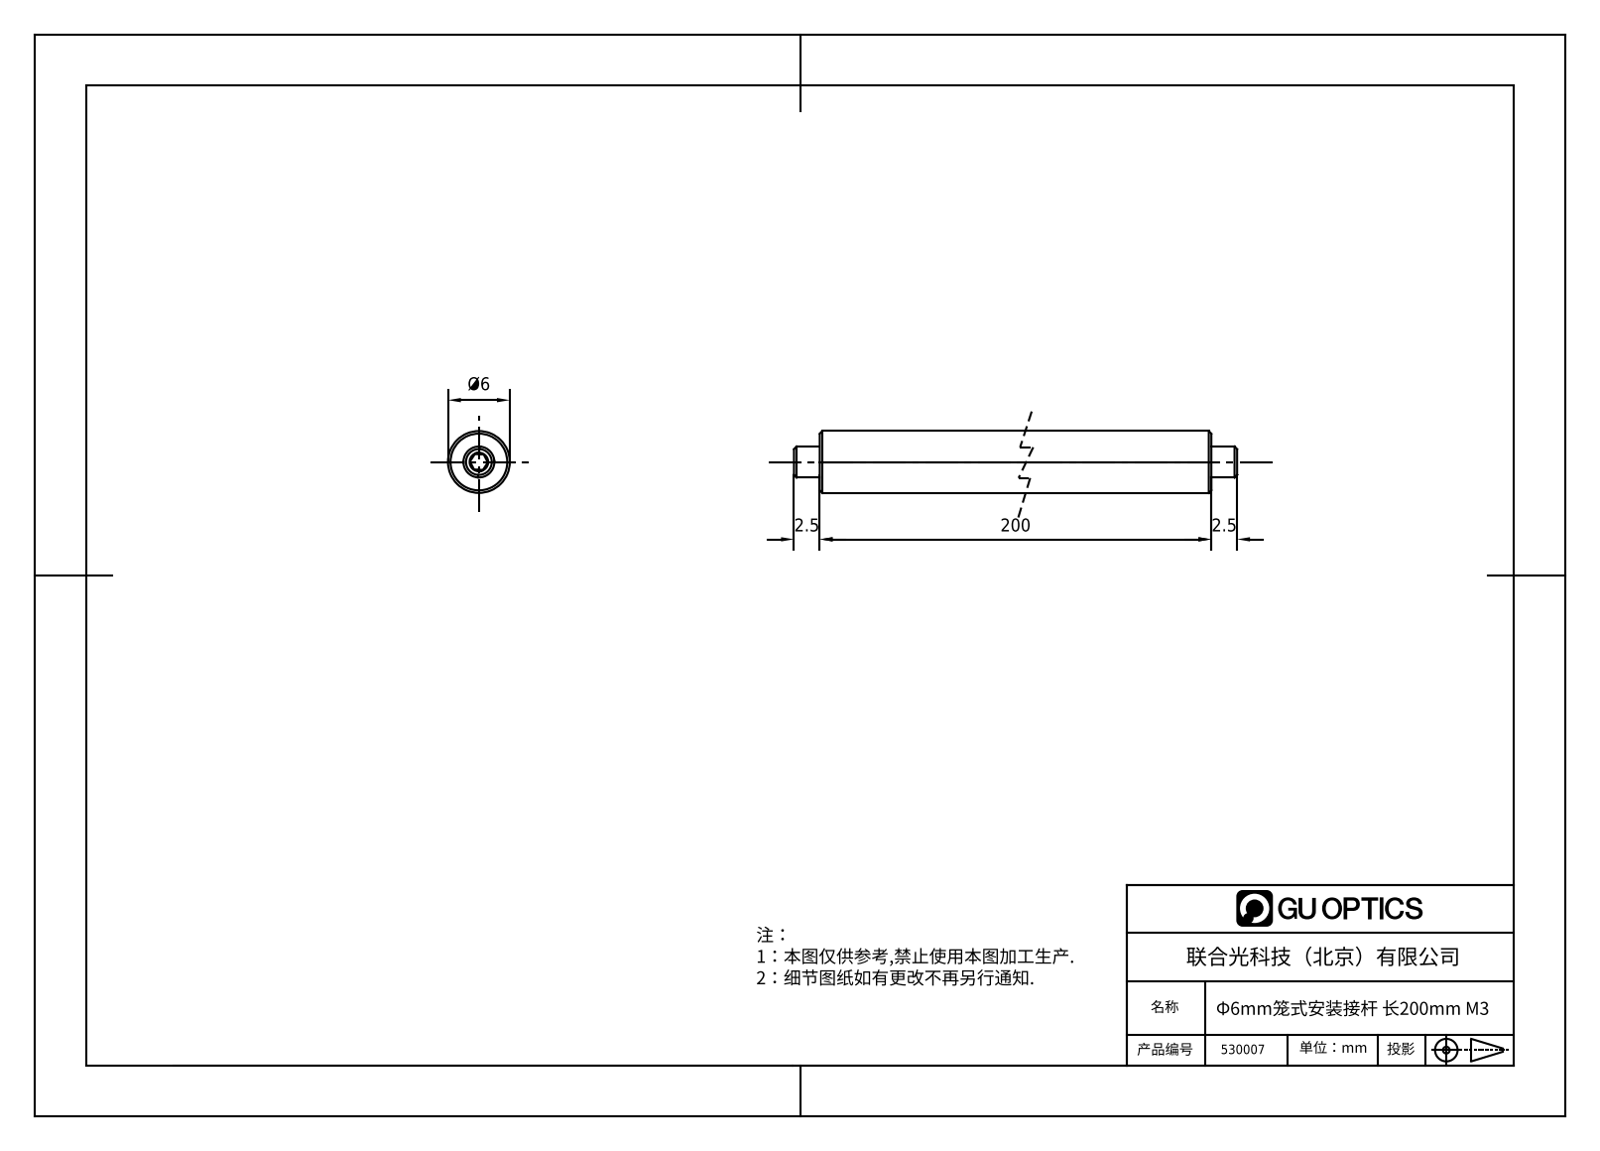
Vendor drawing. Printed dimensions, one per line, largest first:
200
Ø6
2.5
2.5
